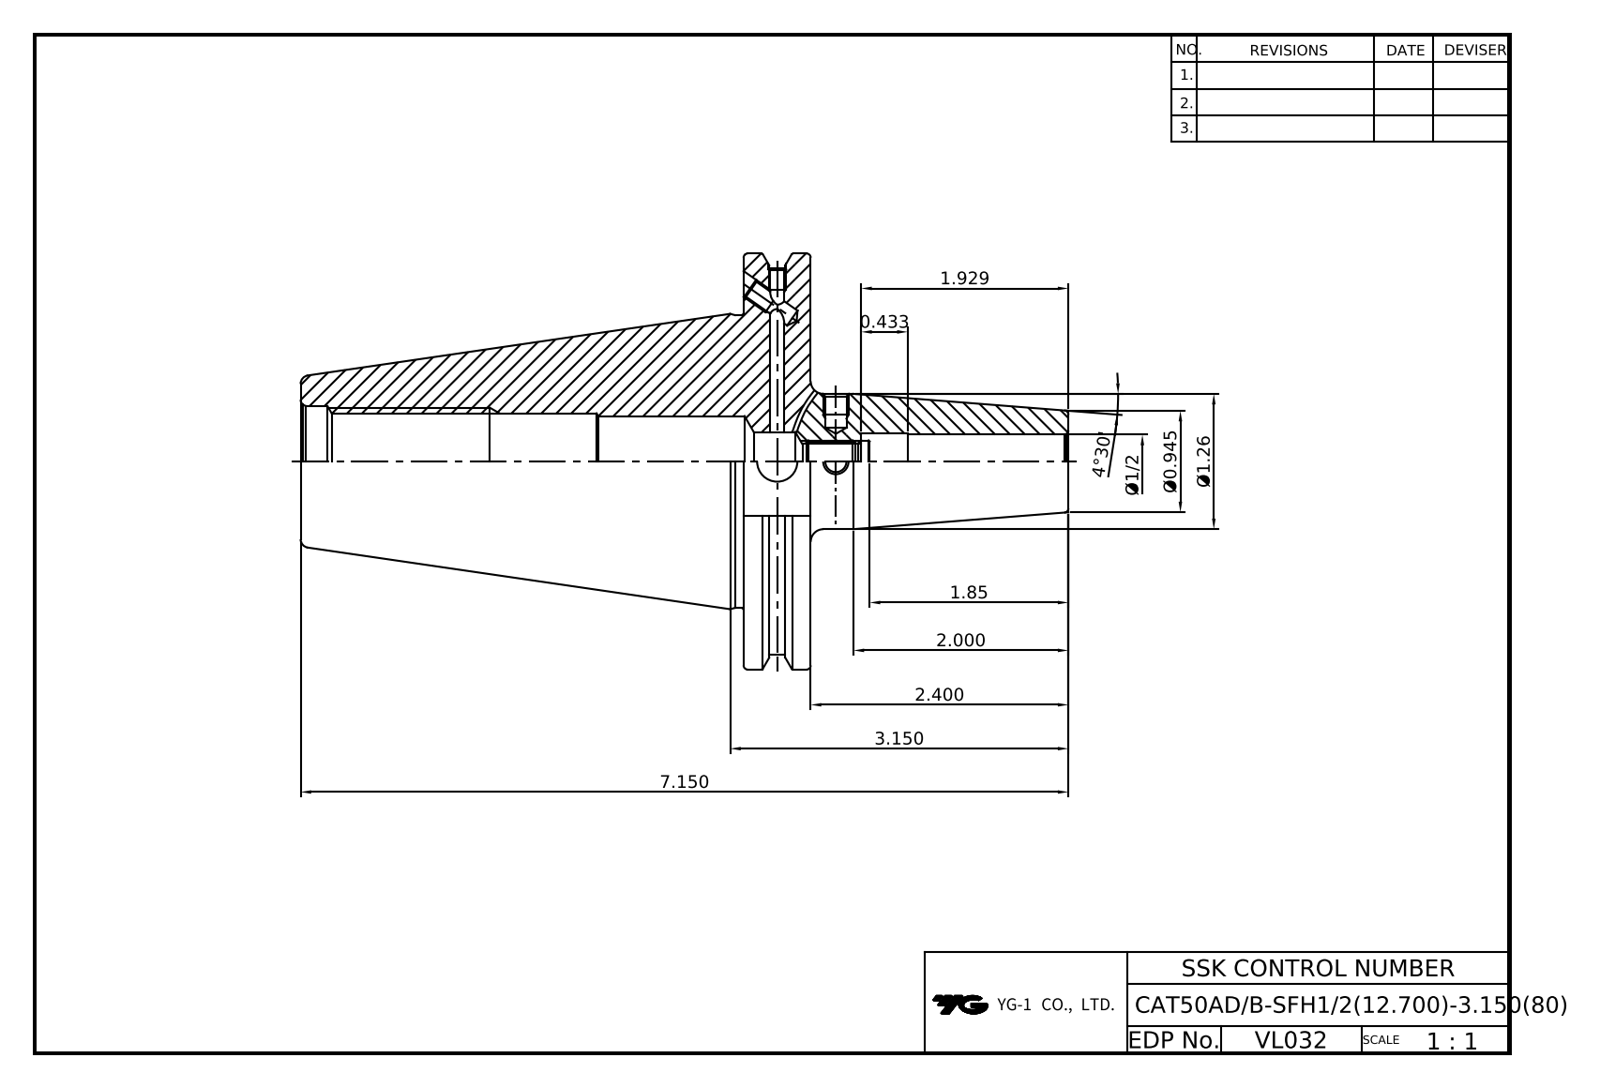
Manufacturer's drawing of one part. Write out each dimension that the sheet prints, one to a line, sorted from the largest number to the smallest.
7.150
4°30'
3.150
2.400
2.000
1.929
1.85
Ø1.26
Ø0.945
Ø1/2
0.433
